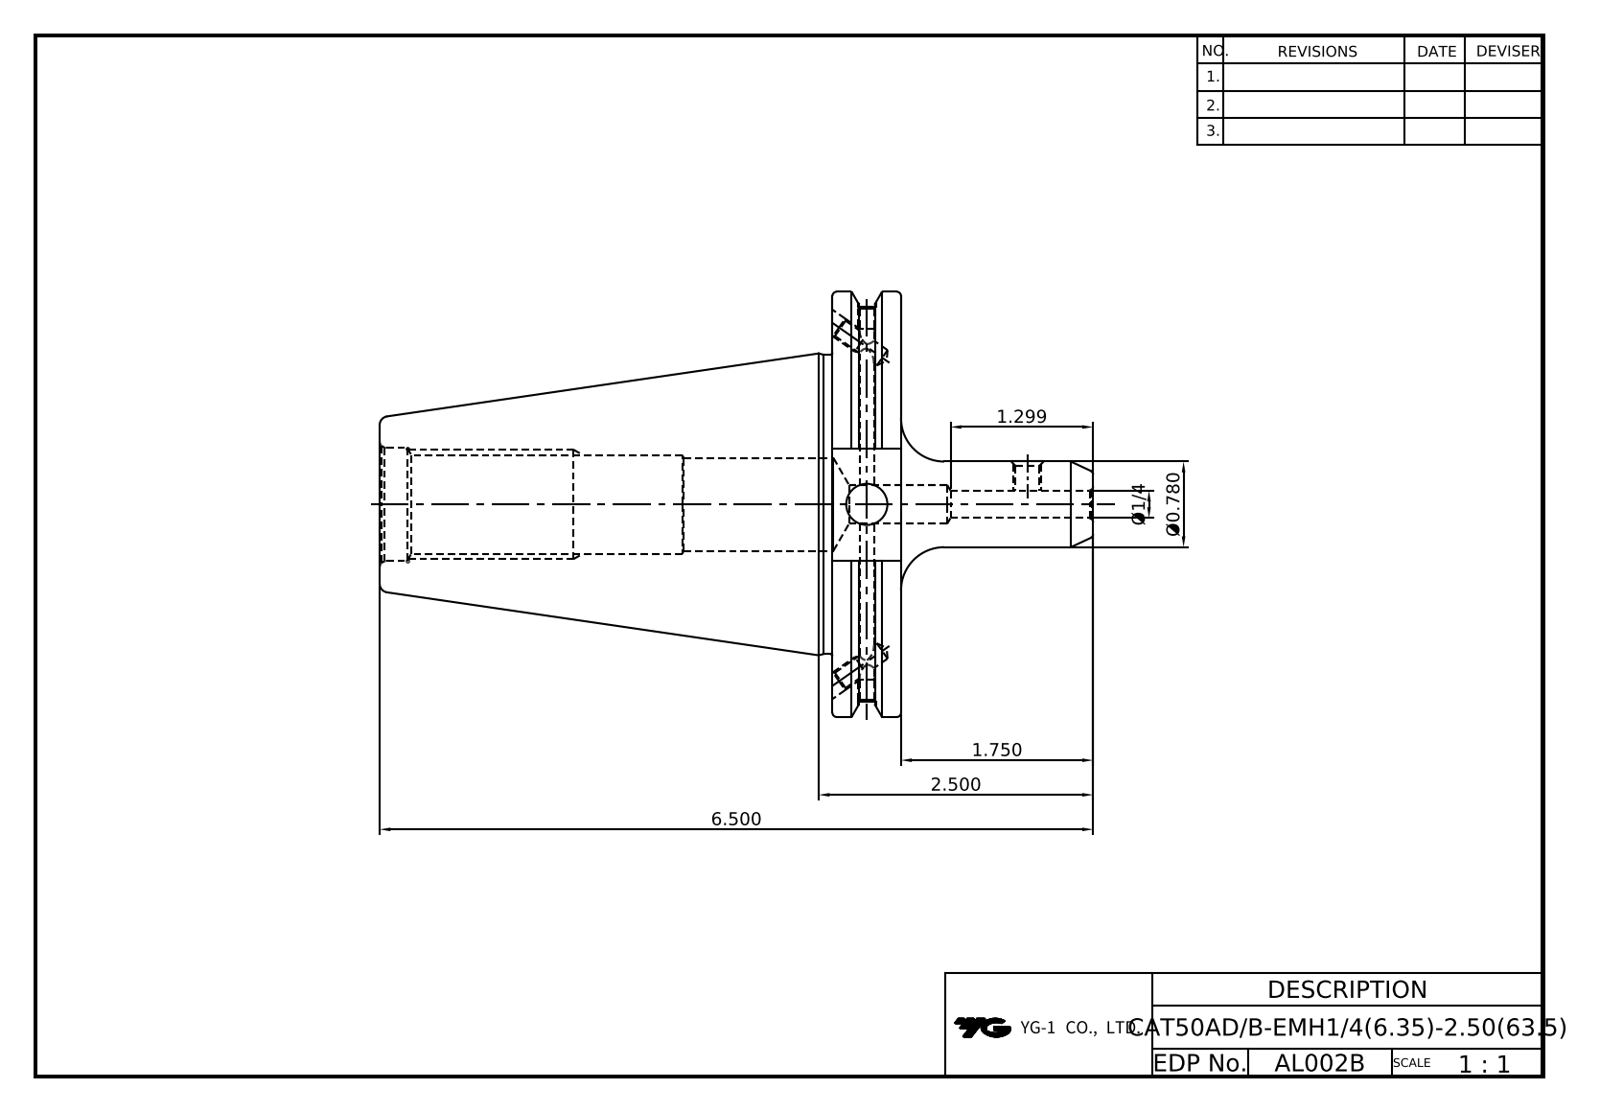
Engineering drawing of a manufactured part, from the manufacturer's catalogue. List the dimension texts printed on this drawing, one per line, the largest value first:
6.500
2.500
1.750
1.299
Ø0.780
Ø1/4
